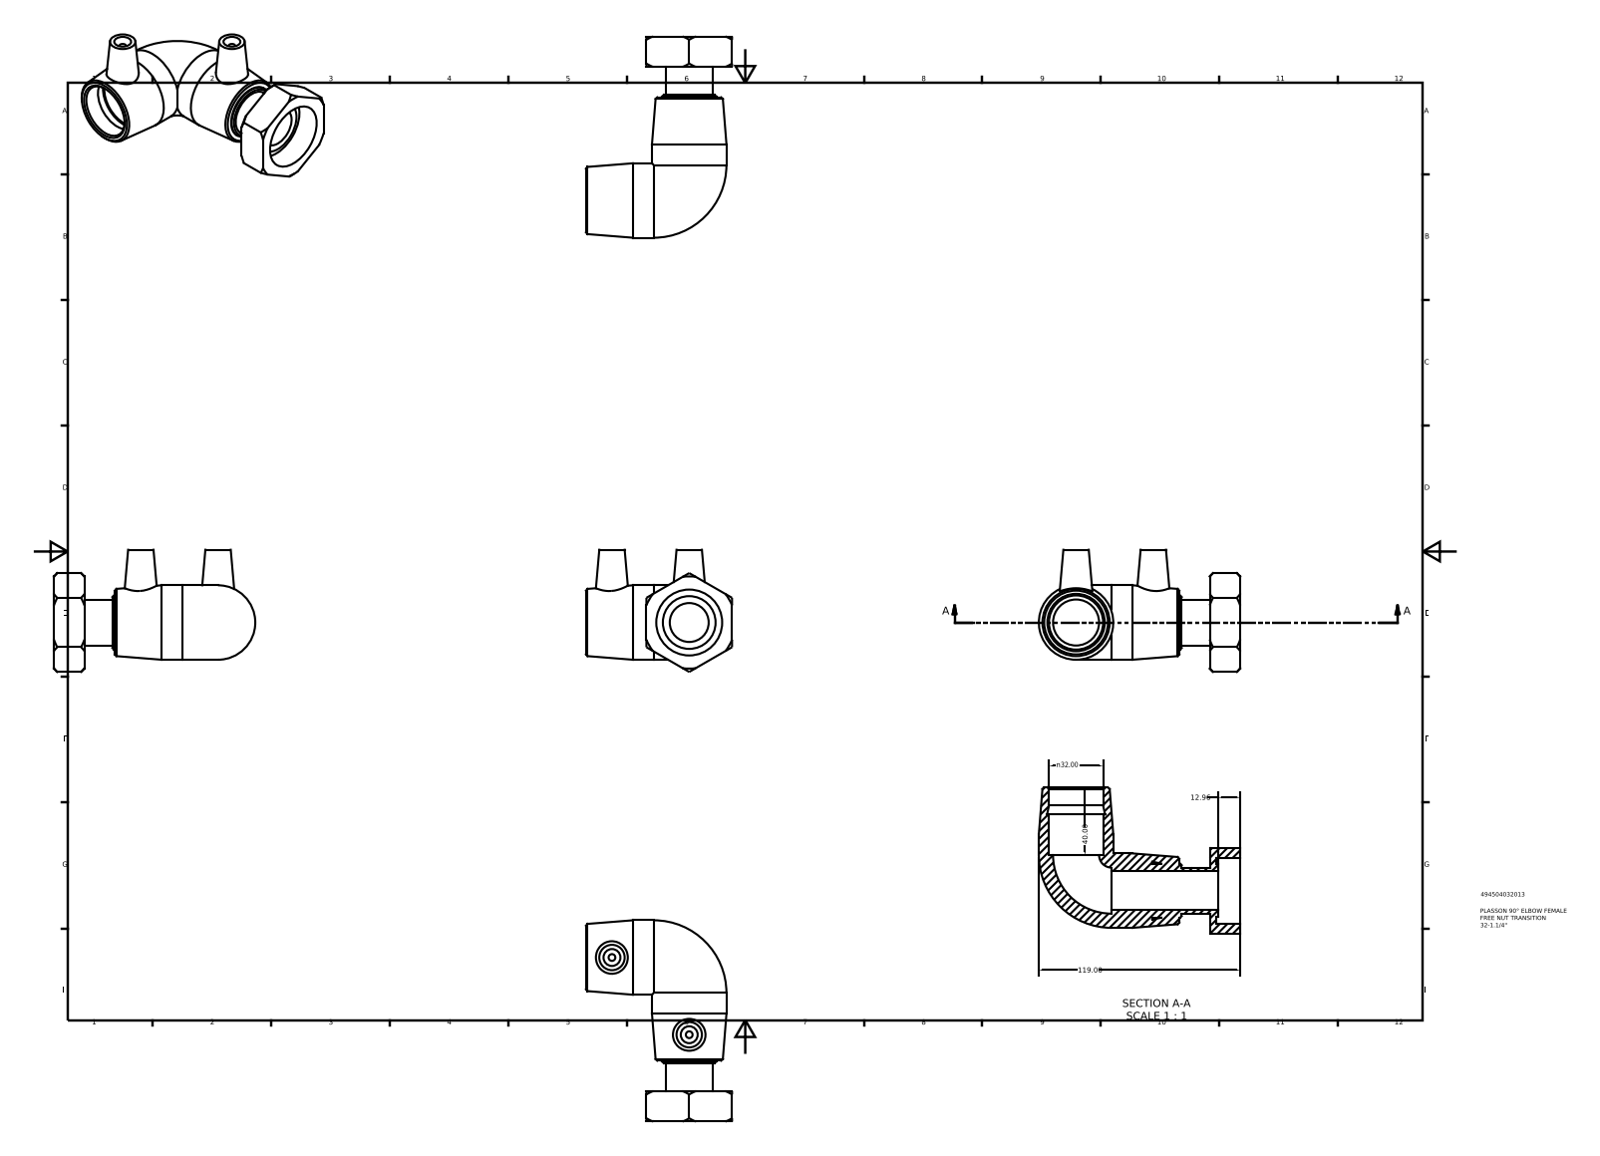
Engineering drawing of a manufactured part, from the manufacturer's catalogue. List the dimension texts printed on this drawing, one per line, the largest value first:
119.00
40.00
n32.00
12.96
